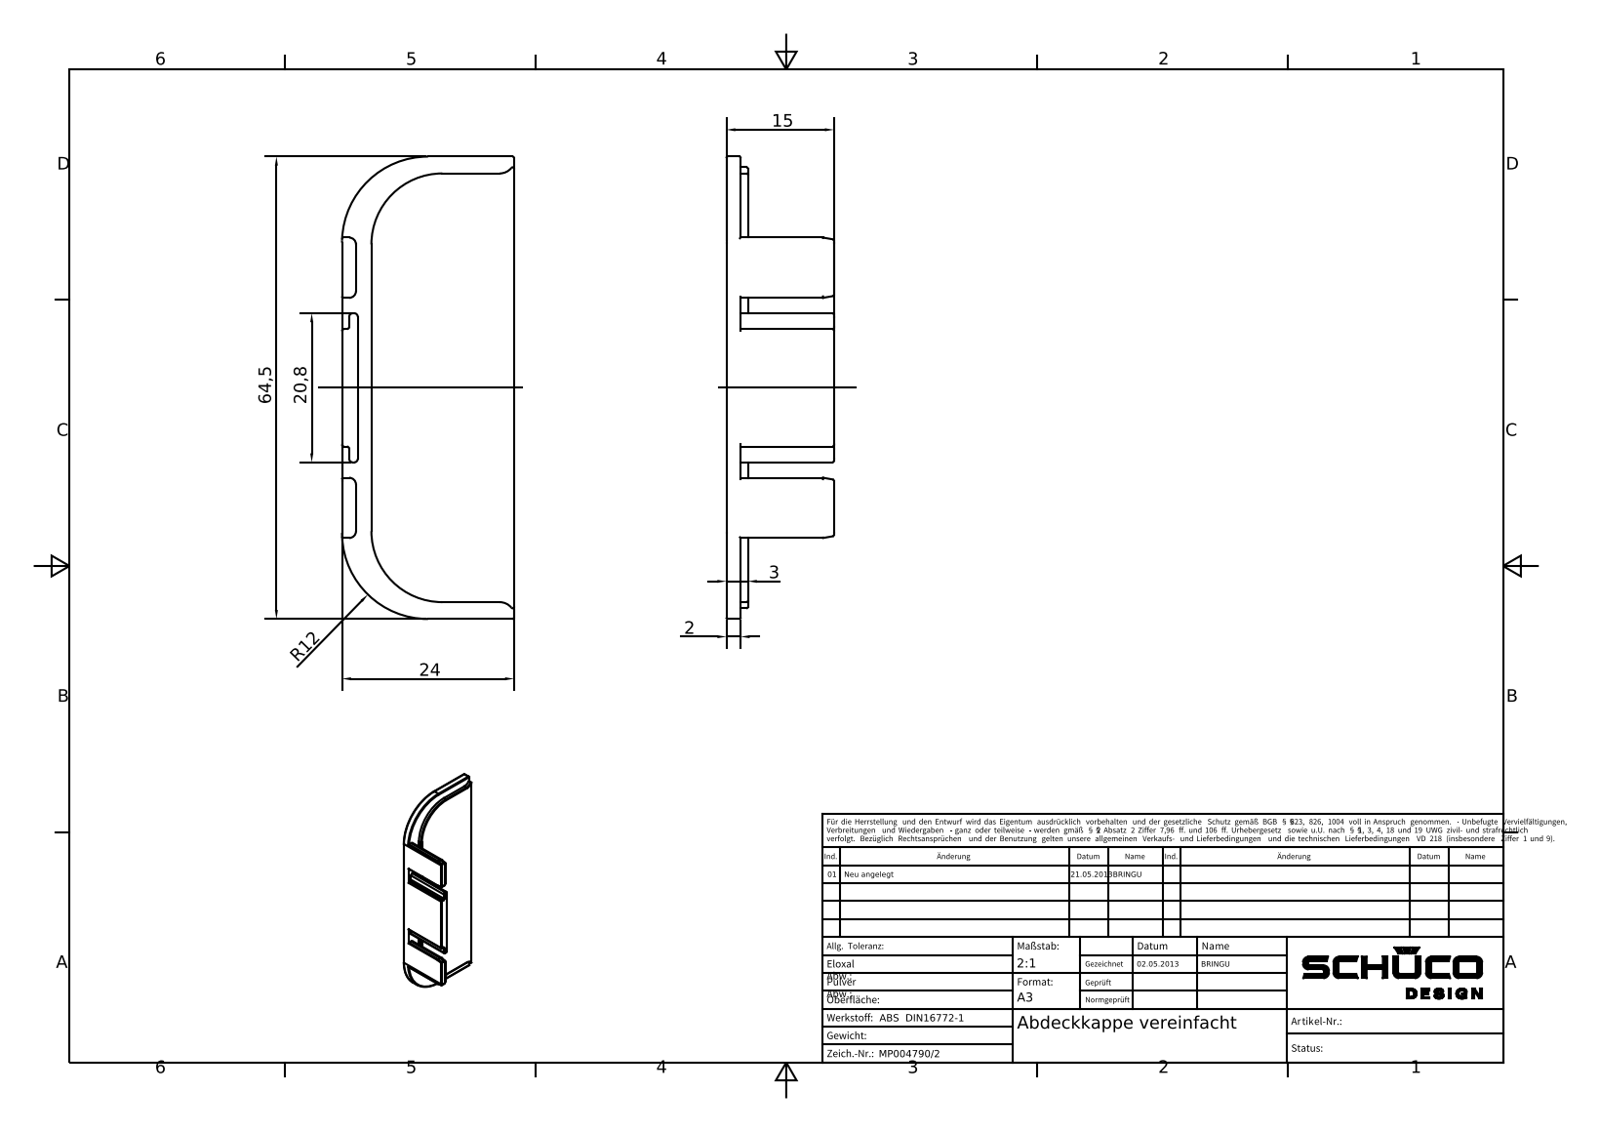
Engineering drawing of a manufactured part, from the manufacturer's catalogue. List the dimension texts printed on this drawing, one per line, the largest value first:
64,5
24
20,8
15
R12
3
2
